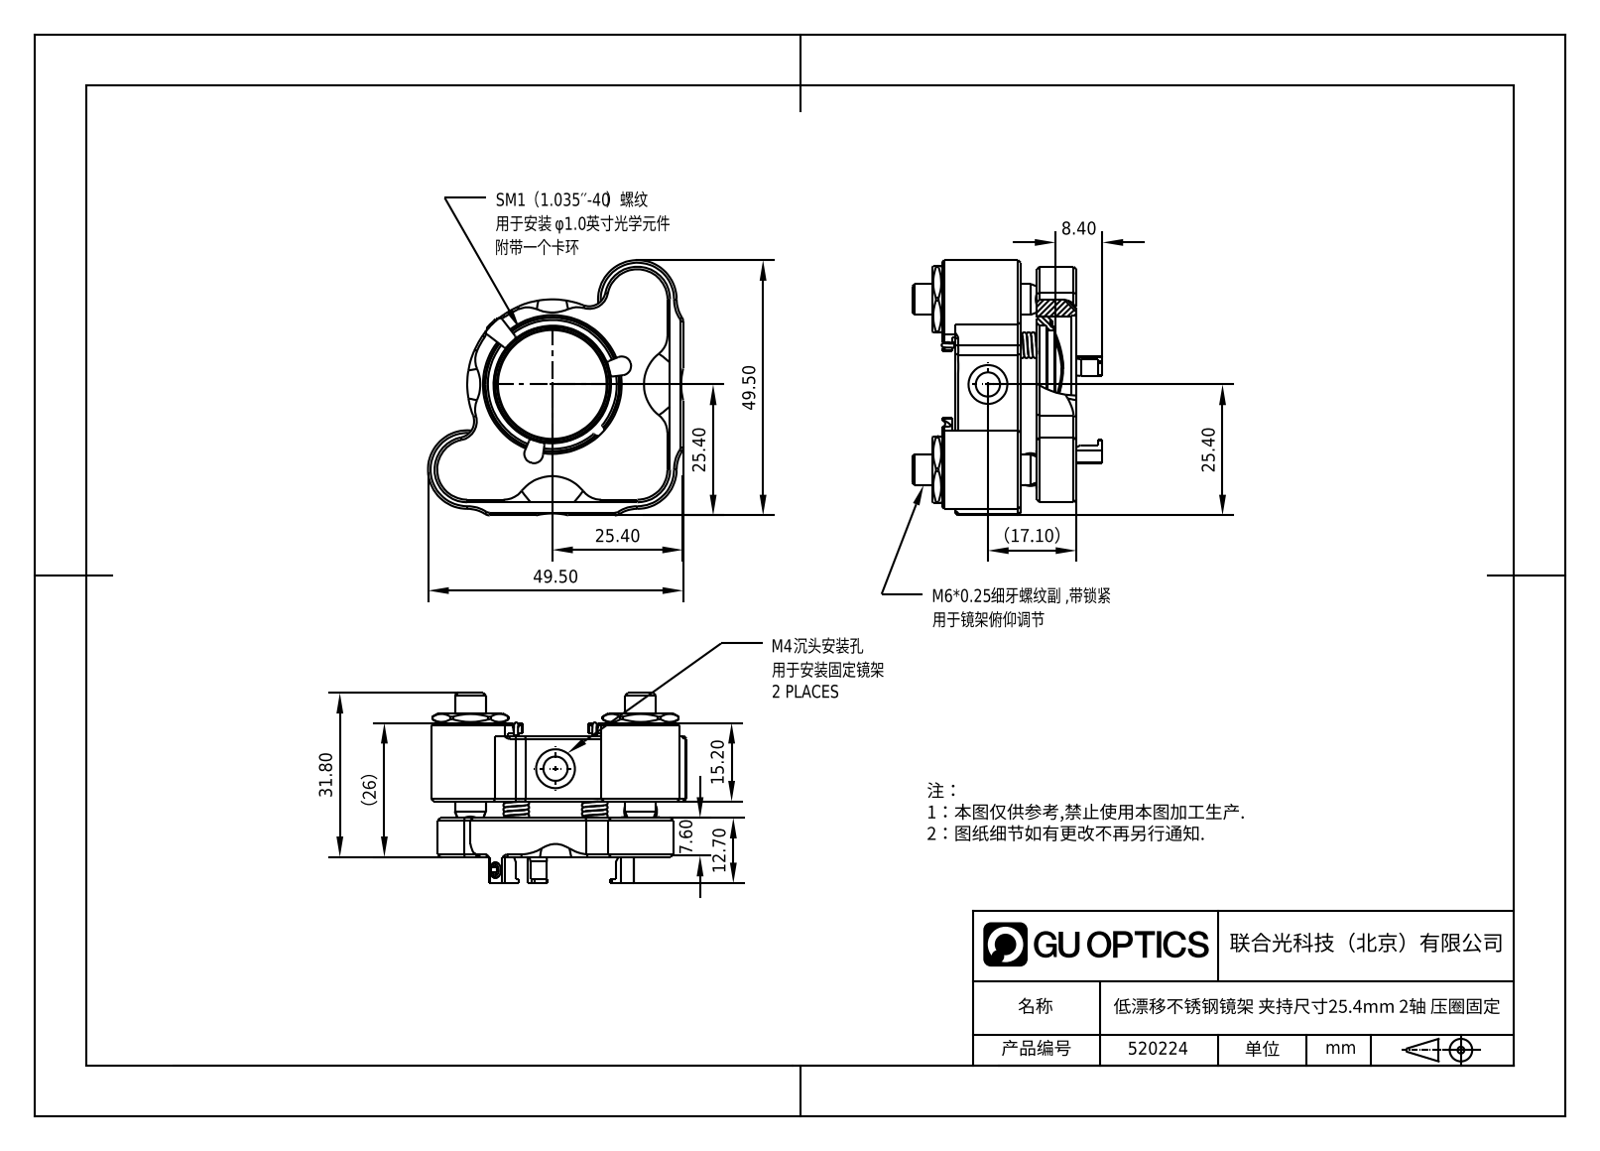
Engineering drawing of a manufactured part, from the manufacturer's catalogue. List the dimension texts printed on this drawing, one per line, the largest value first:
49.50
49.50
31.80
（26）
25.40
25.40
25.40
（17.10）
15.20
12.70
8.40
7.60
